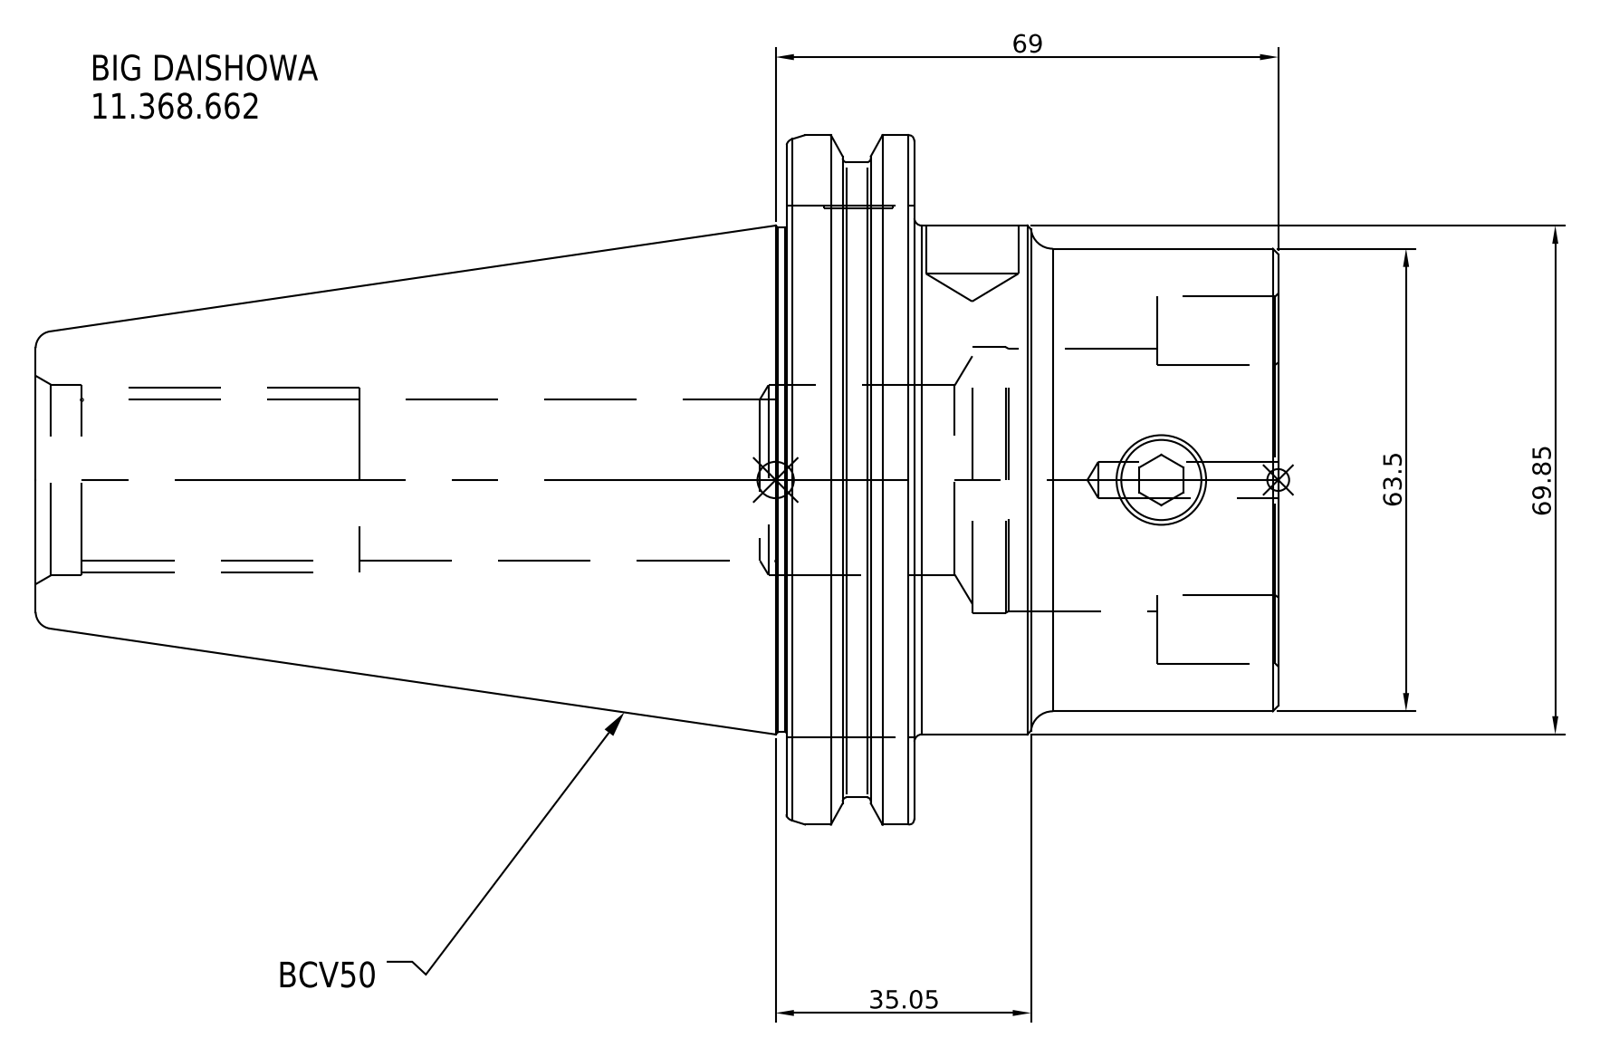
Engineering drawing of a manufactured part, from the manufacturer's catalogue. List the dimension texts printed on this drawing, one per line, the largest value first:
69.85
69
63.5
35.05
